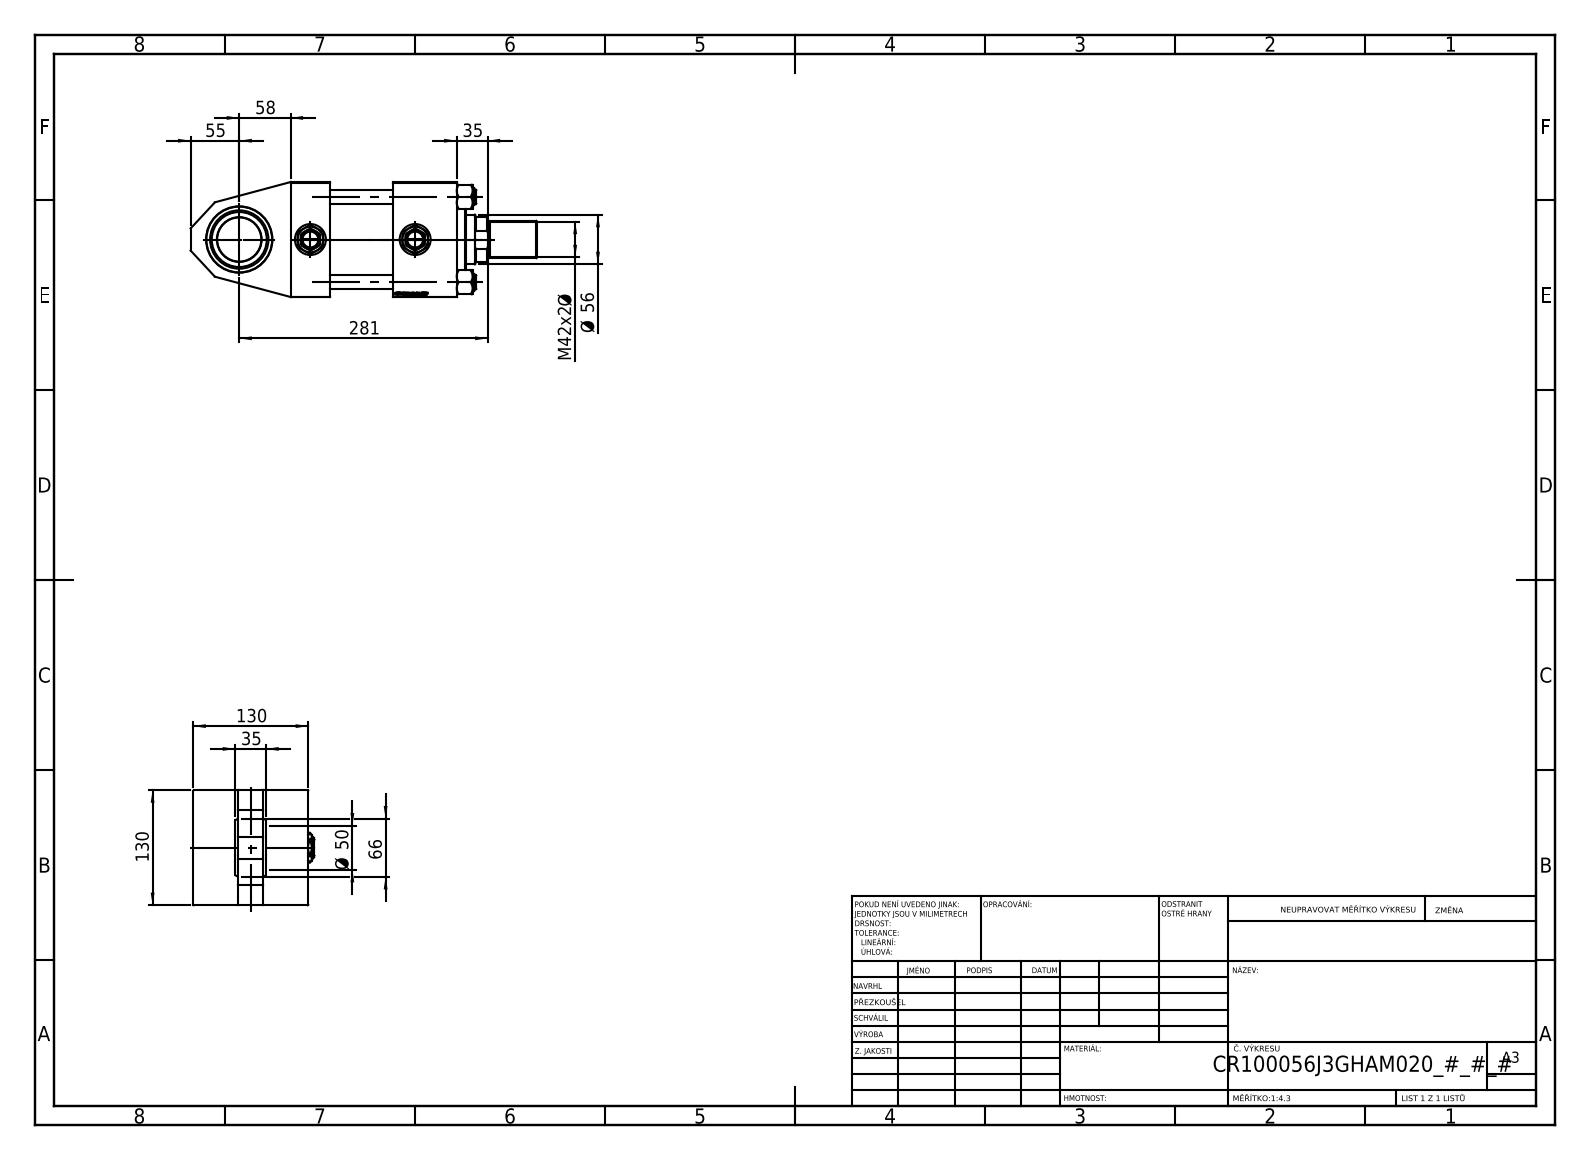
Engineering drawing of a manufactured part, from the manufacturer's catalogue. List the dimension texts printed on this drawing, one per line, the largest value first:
281
130
130
66
58
Ø 56
55
Ø 50
M42x2 Ø
35
35
